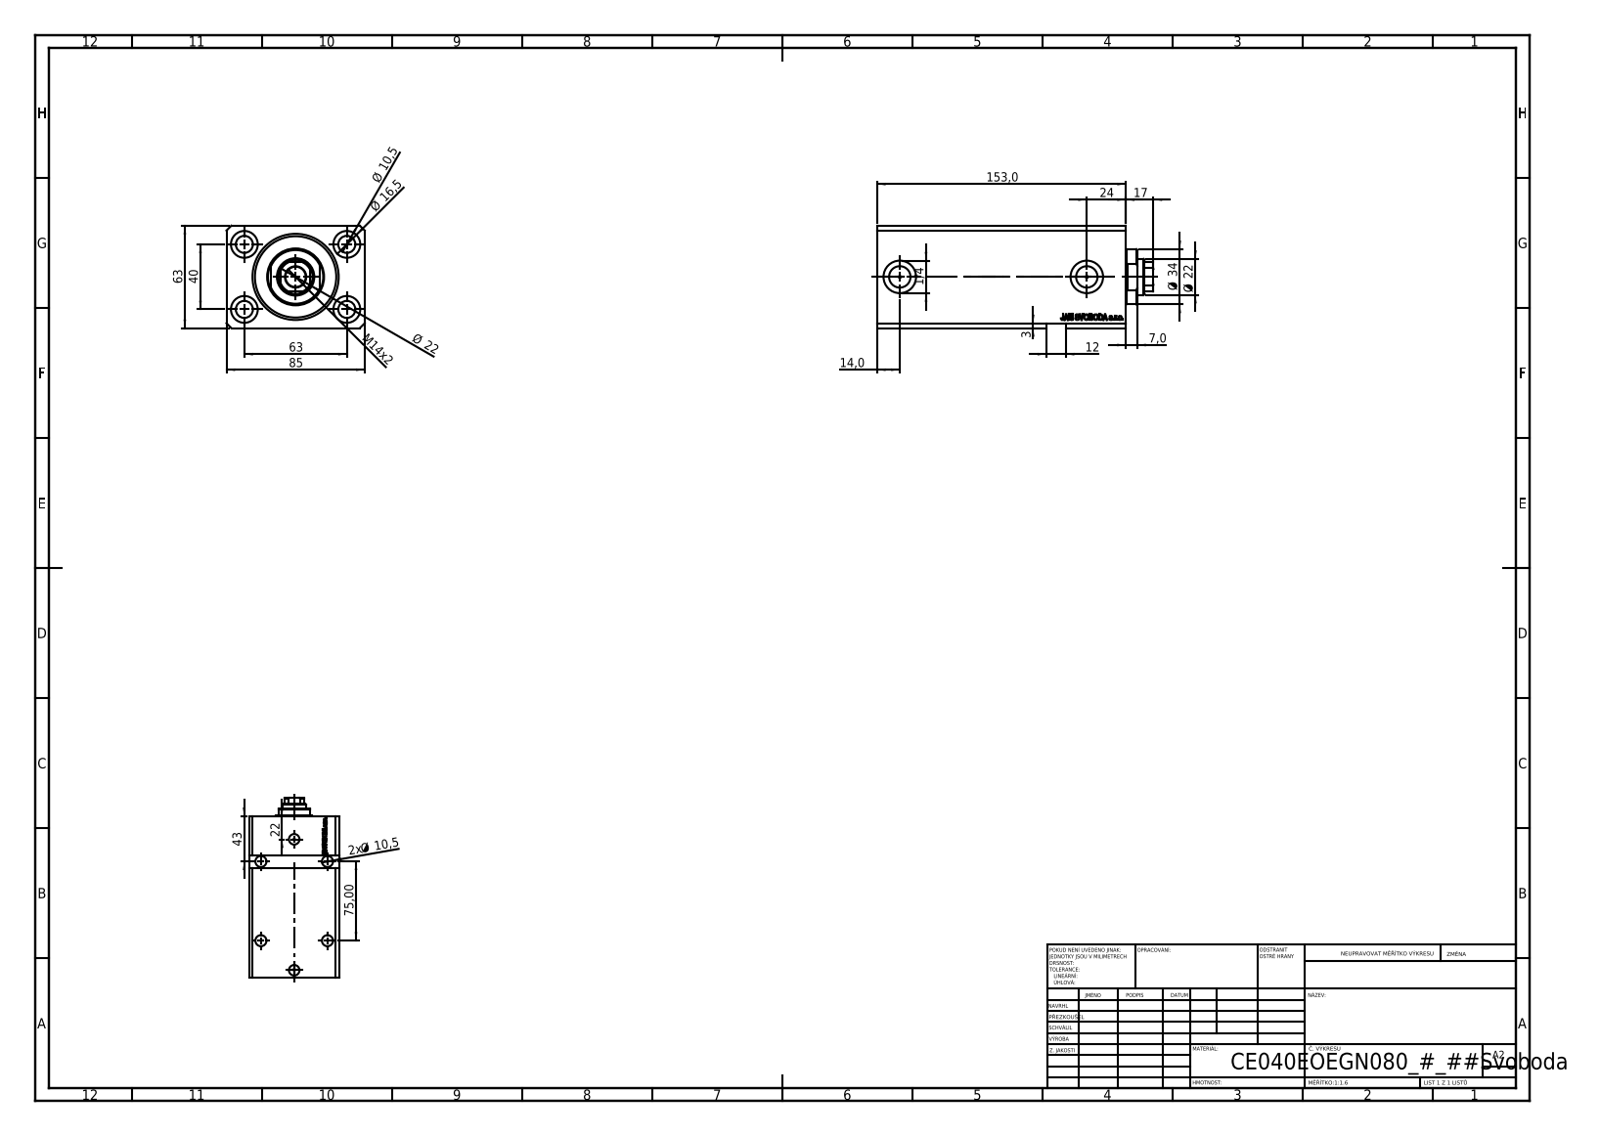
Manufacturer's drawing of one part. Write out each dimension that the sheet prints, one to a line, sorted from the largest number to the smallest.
153,0
85
75,00
63
63
43
40
Ø 34
24
Ø 22
Ø 22
22
17
Ø 16,5
M14x2
14,0
12
Ø 10,5
2x Ø 10,5
7,0
3
1/4
